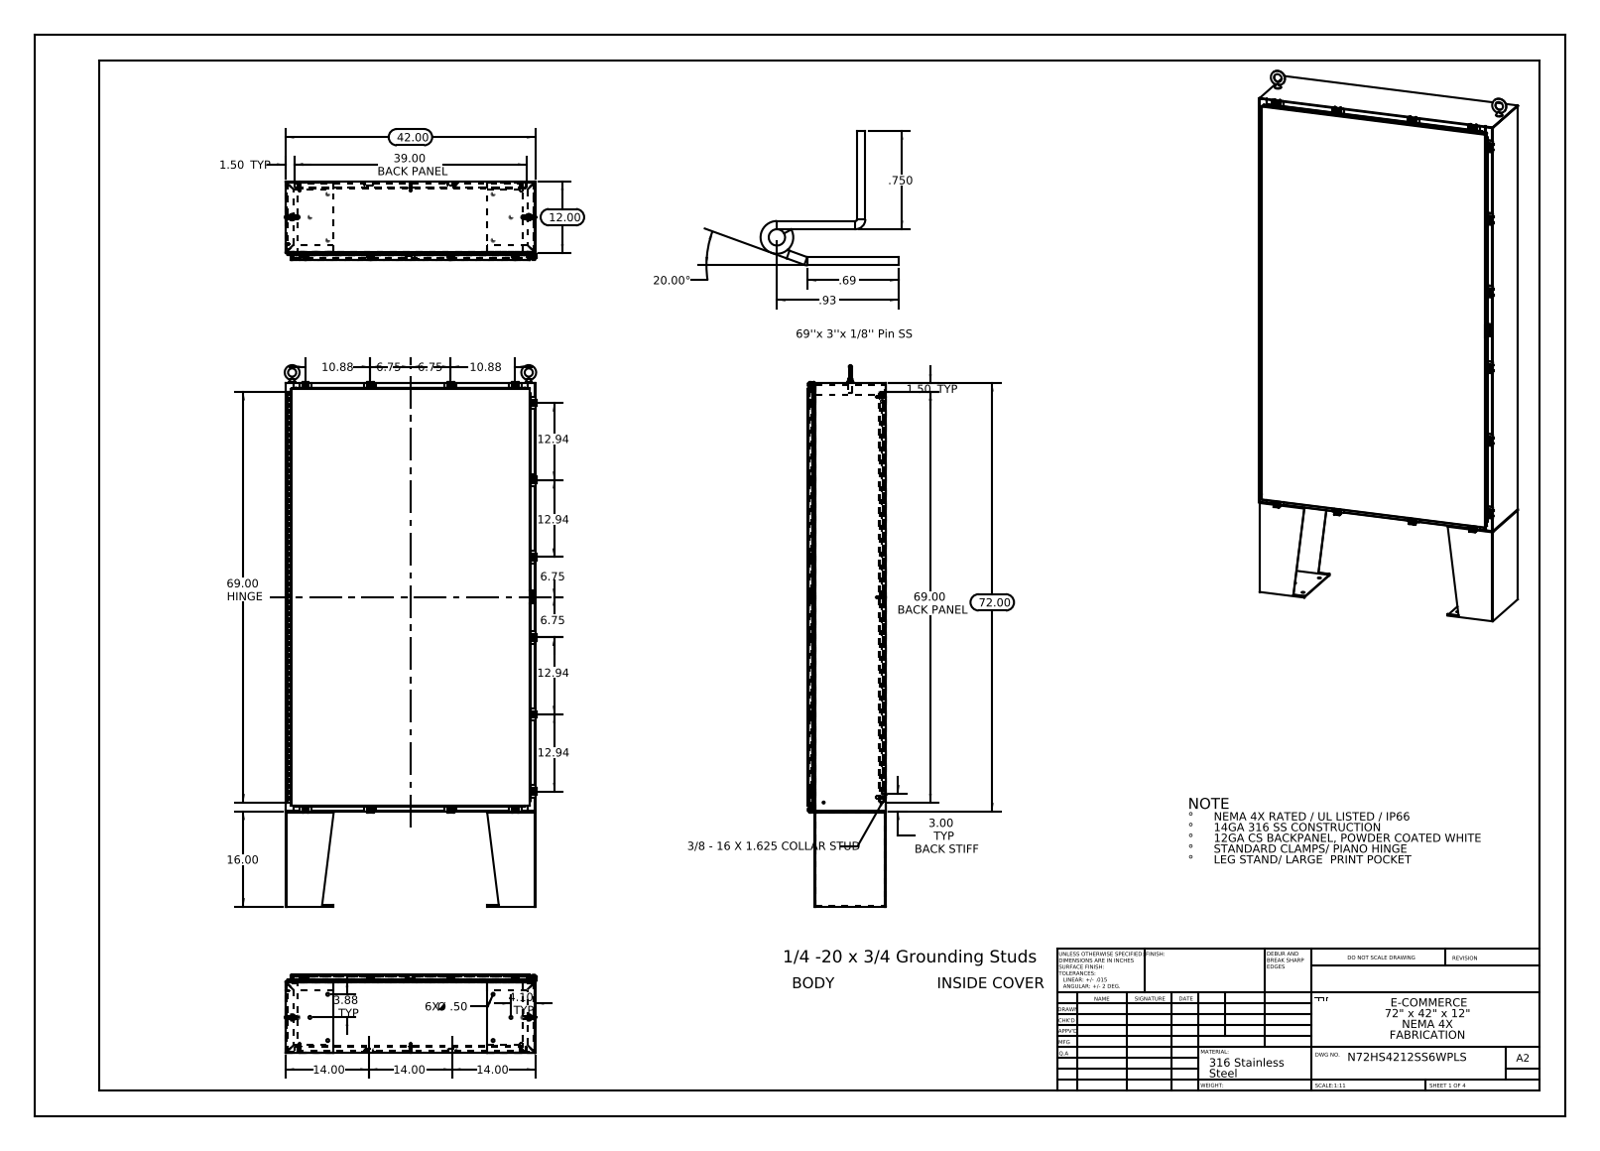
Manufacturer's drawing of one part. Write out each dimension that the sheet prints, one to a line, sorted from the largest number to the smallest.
72.00
69.00 HINGE
69.00 BACK PANEL
42.00
39.00 BACK PANEL
20.00°
16.00
14.00
14.00
14.00
12.94
12.94
12.94
12.94
12.00
10.88
10.88
6.75
6.75
6.75
6.75
4.10 TYP
3.88 TYP
3.00 TYP BACK STIFF
1.50 TYP
1.50 TYP
.93
.750
.69
6X Ø .50
